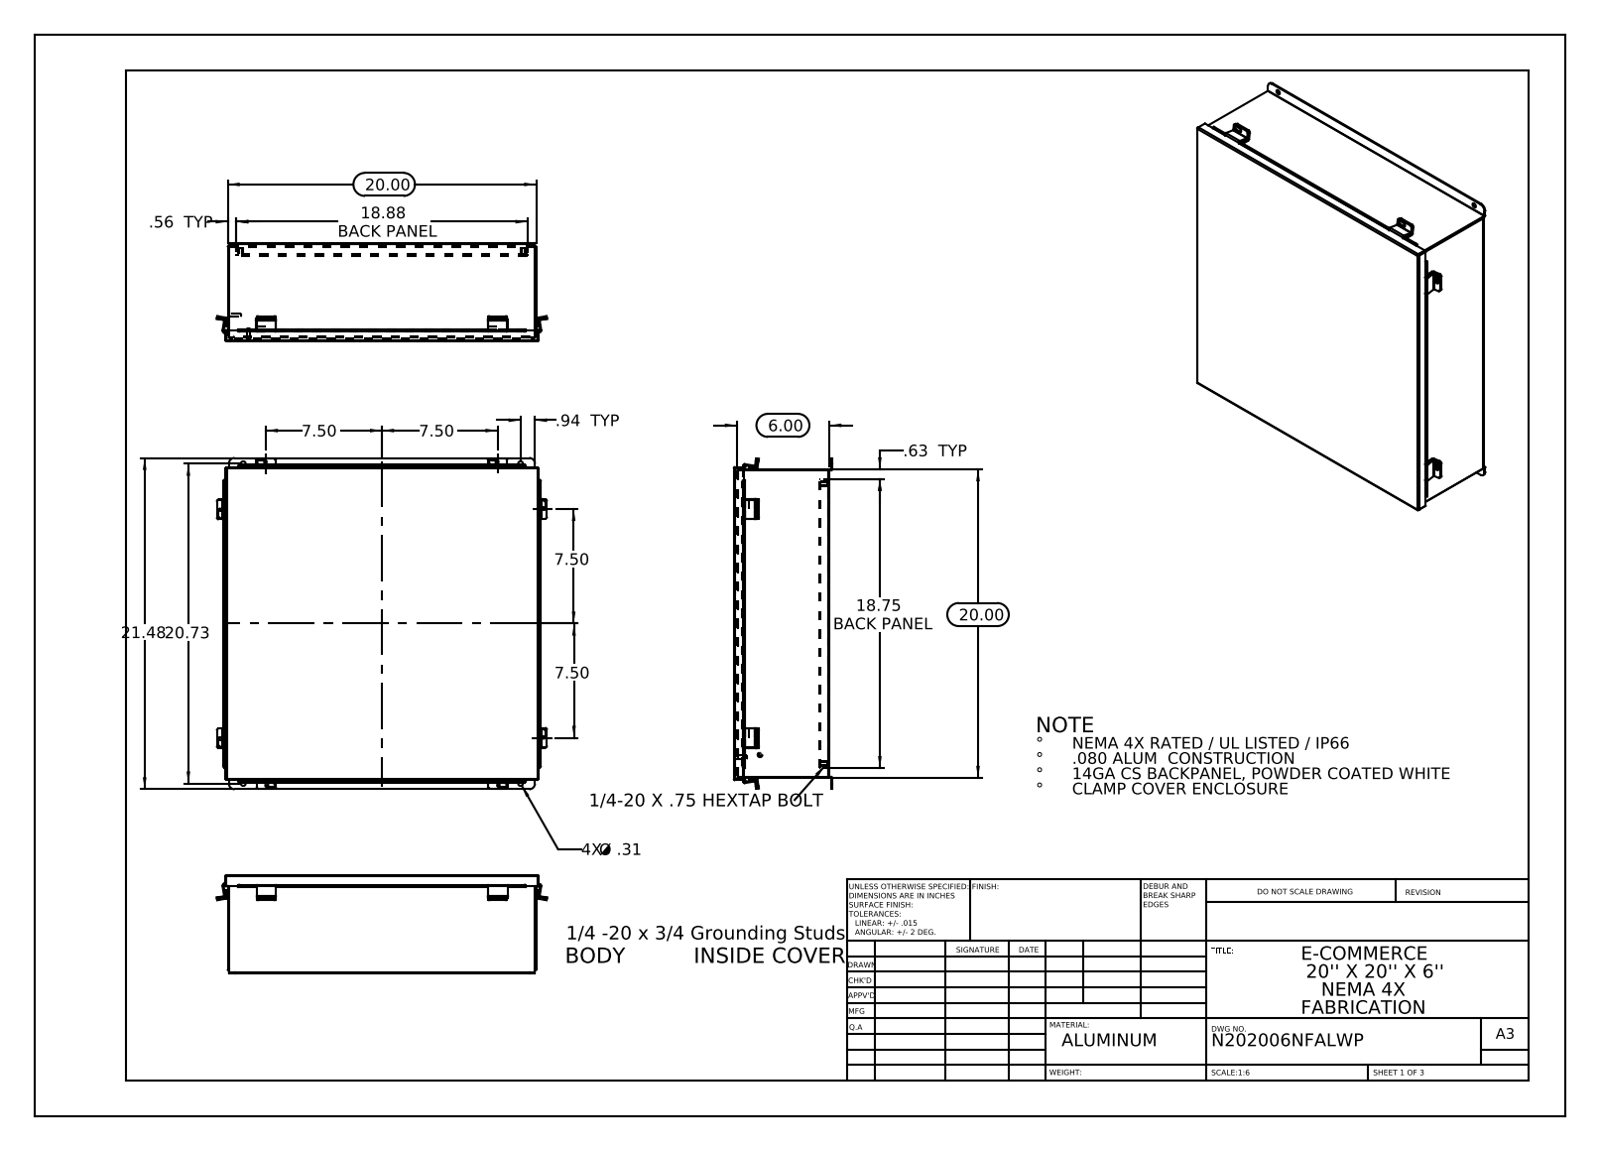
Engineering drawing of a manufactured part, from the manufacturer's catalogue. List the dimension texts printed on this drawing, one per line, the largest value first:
21.48
20.73
20.00
20.00
18.88 BACK PANEL
18.75 BACK PANEL
7.50
7.50
7.50
7.50
6.00
.94 TYP
.63 TYP
.56 TYP
4X Ø .31
